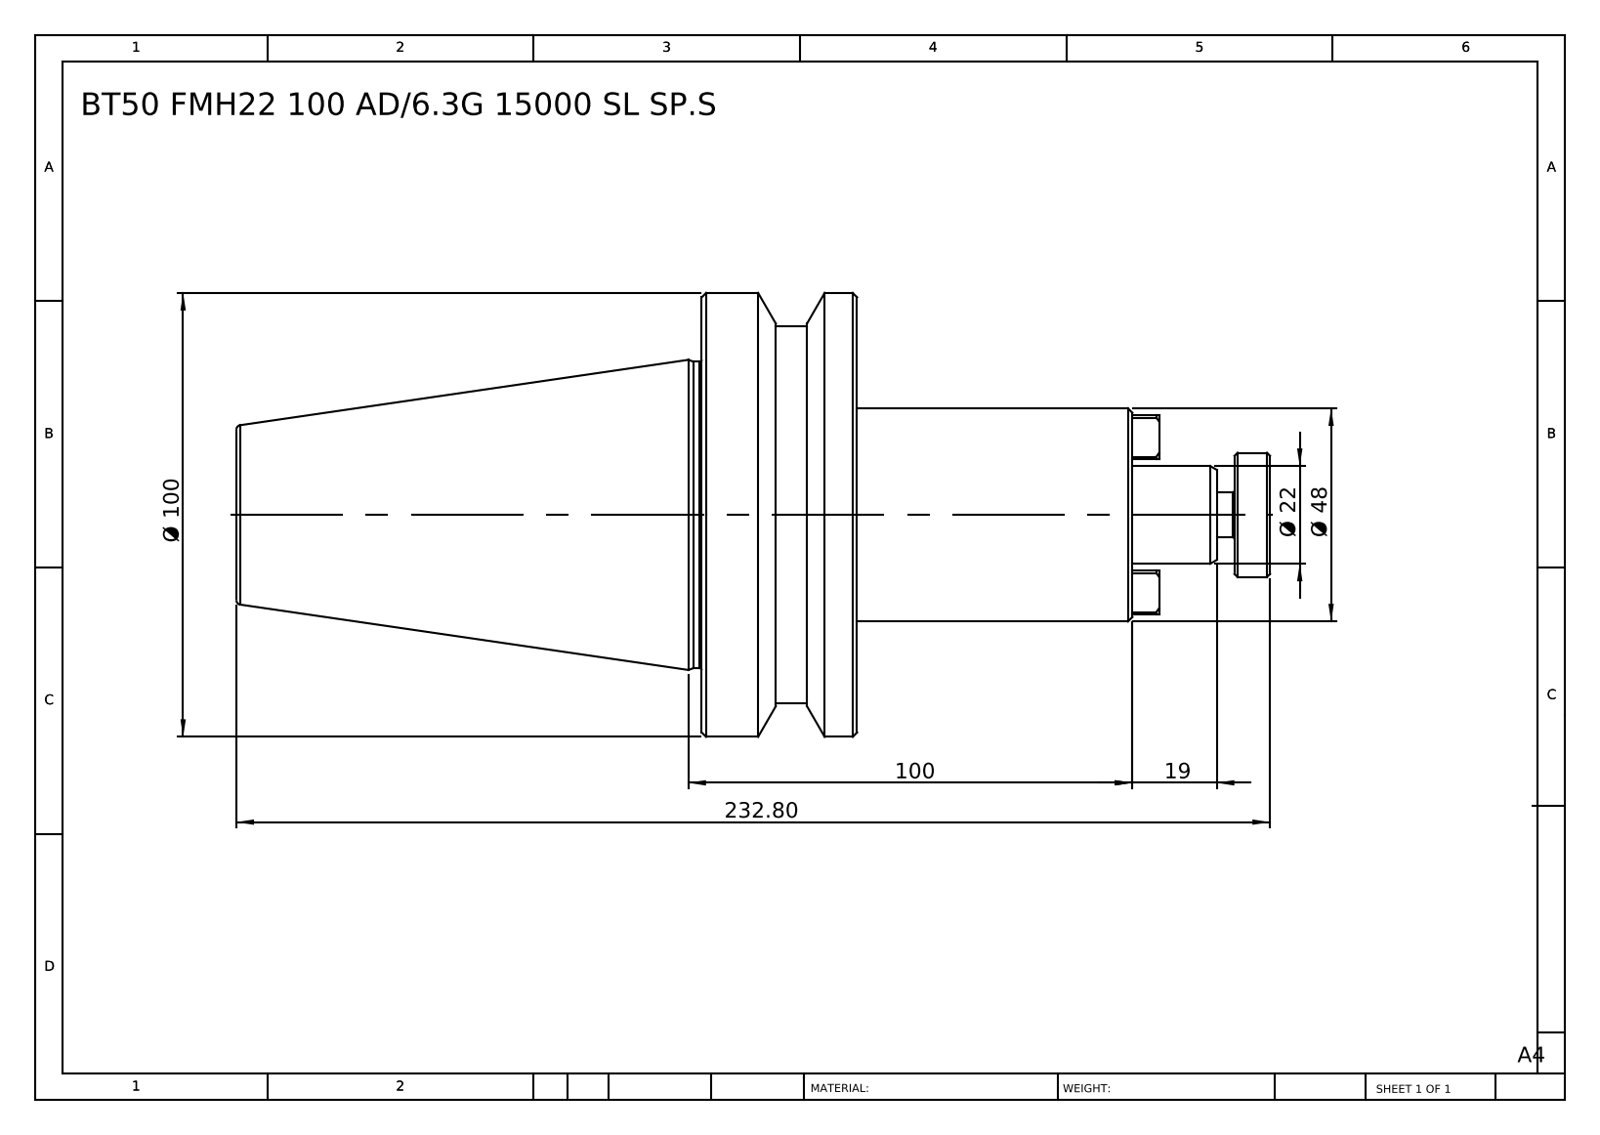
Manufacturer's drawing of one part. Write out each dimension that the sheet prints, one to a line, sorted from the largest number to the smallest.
232.80
100
Ø 100
Ø 48
Ø 22
19
